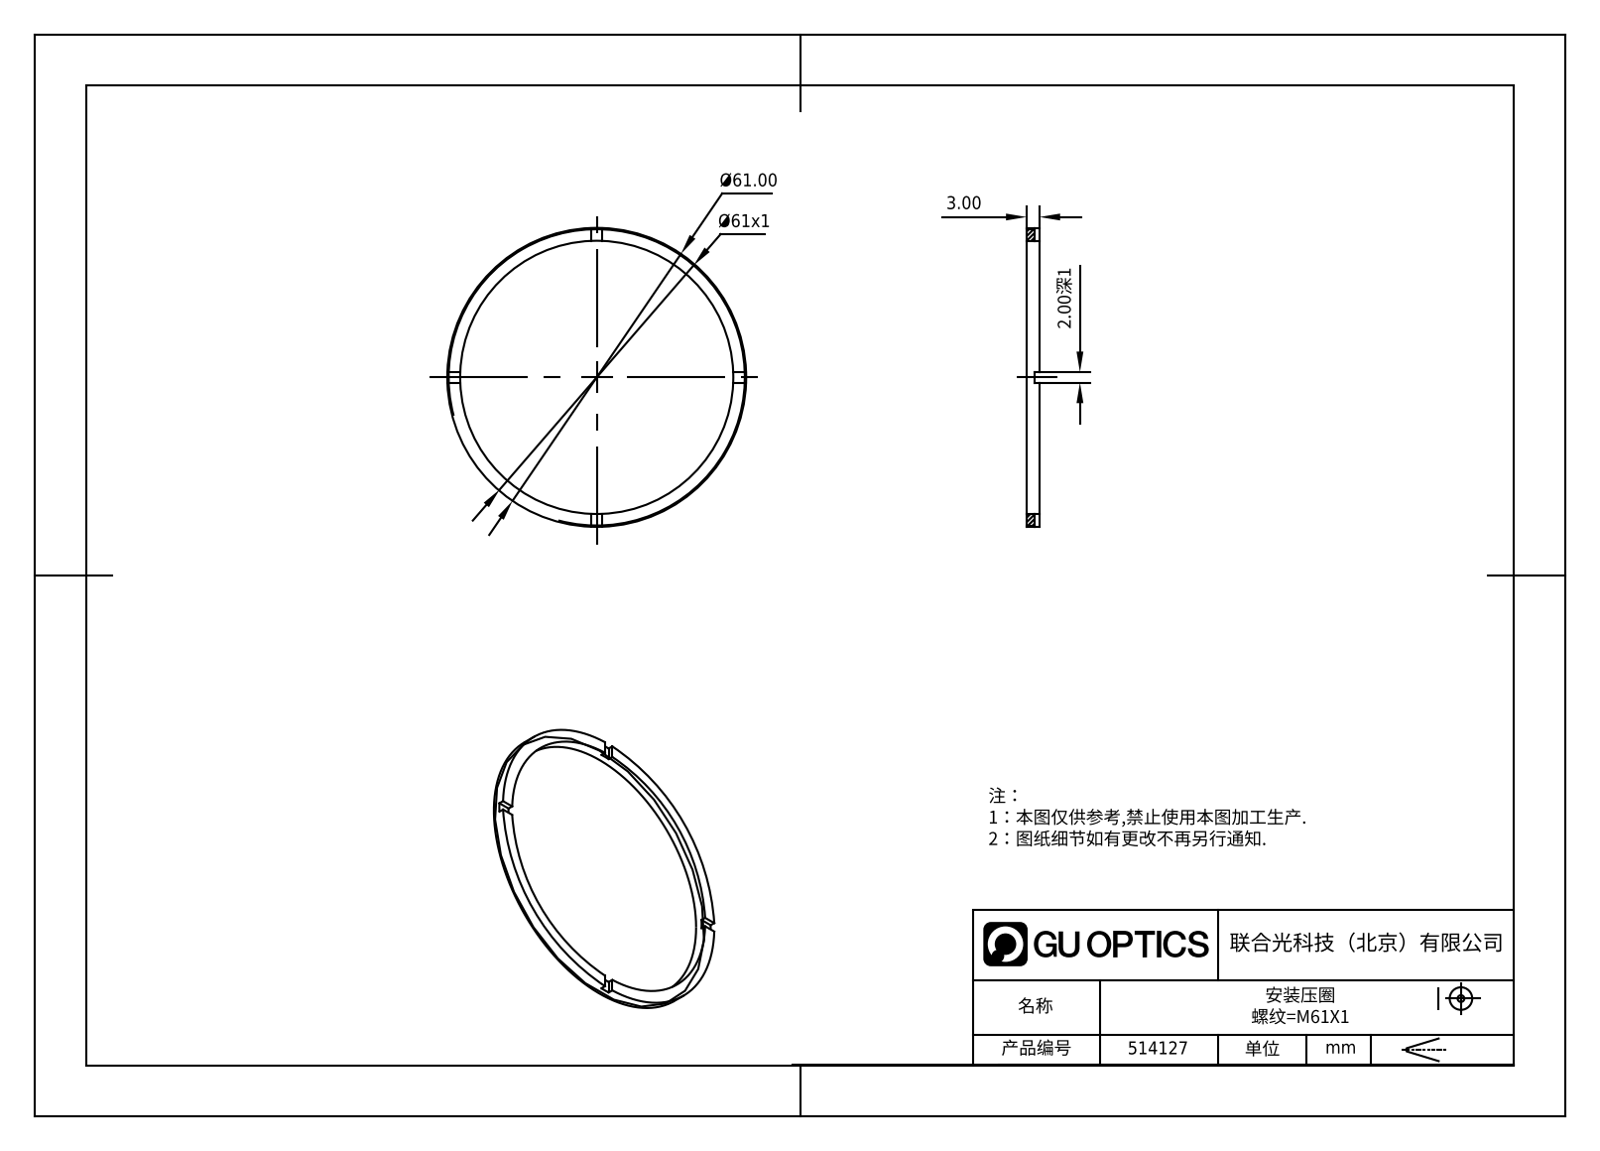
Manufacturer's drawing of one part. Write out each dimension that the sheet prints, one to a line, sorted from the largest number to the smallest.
Ø61.00
Ø61x1
3.00
2.00深1
